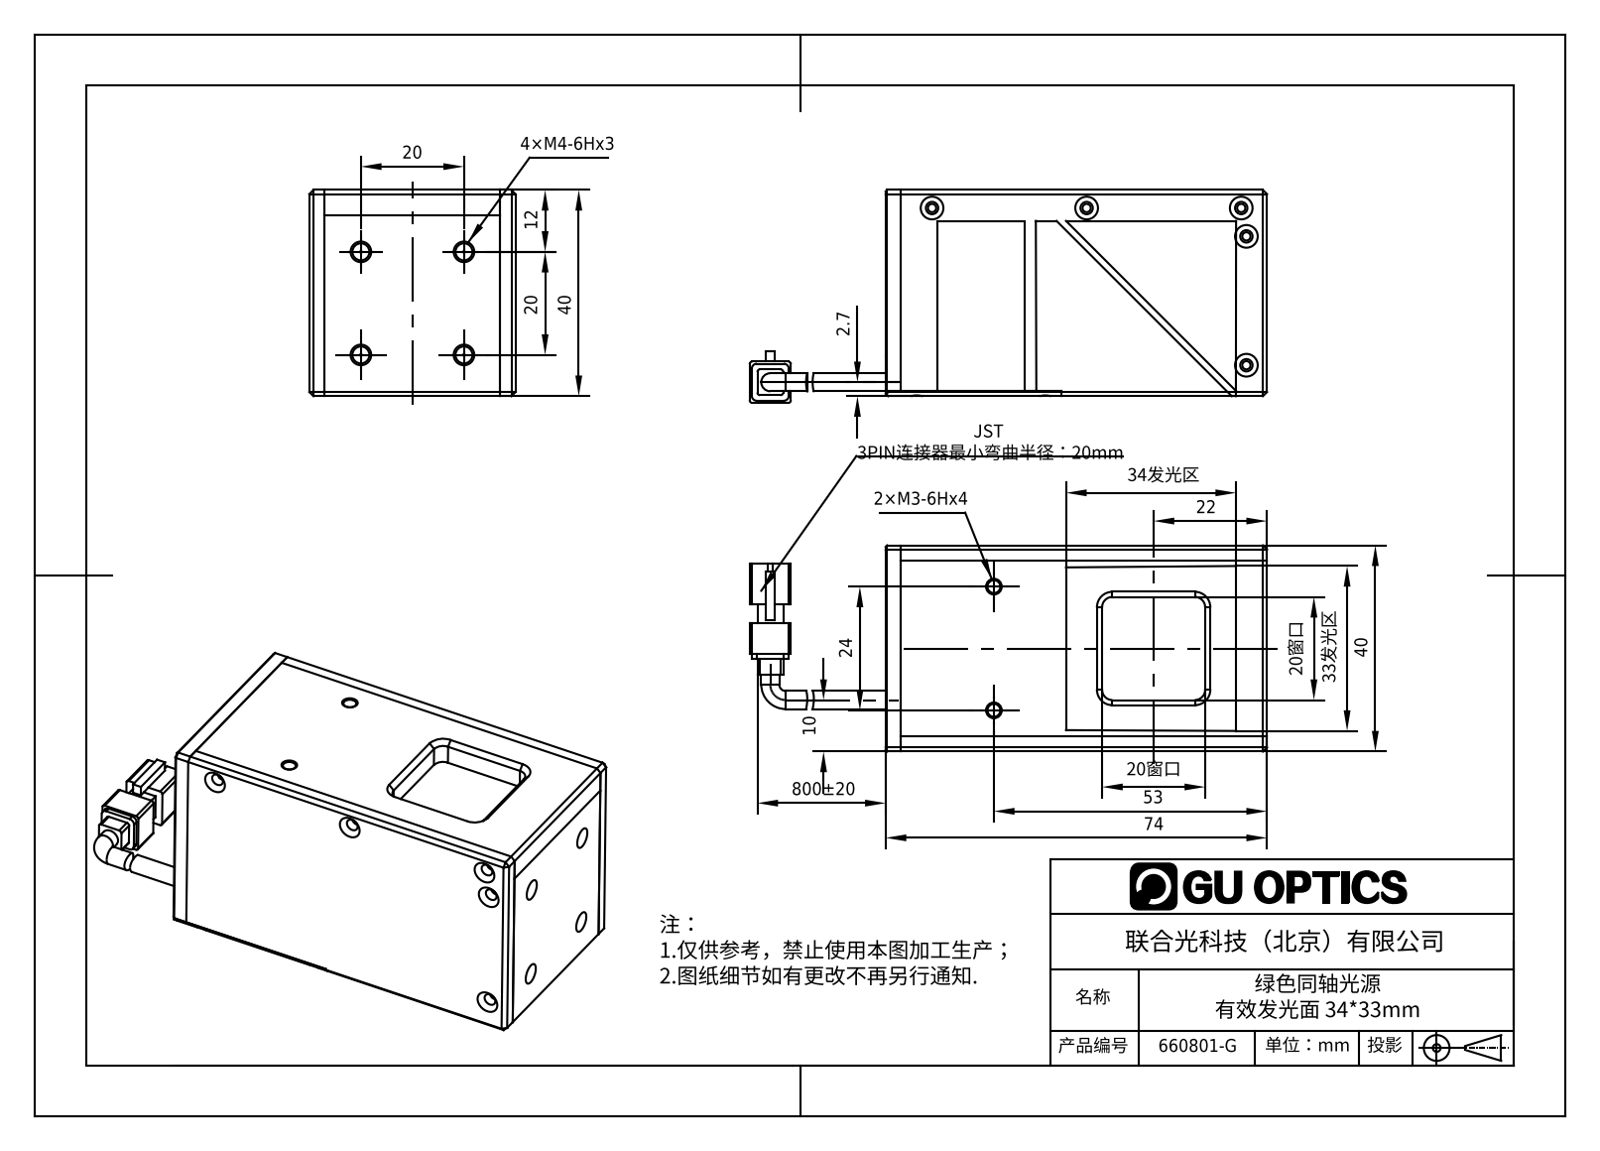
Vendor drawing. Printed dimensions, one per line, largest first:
800±20
74
53
40
40
34发光区
33发光区
24
22
20窗口
20窗口
20
20
12
10
2.7
